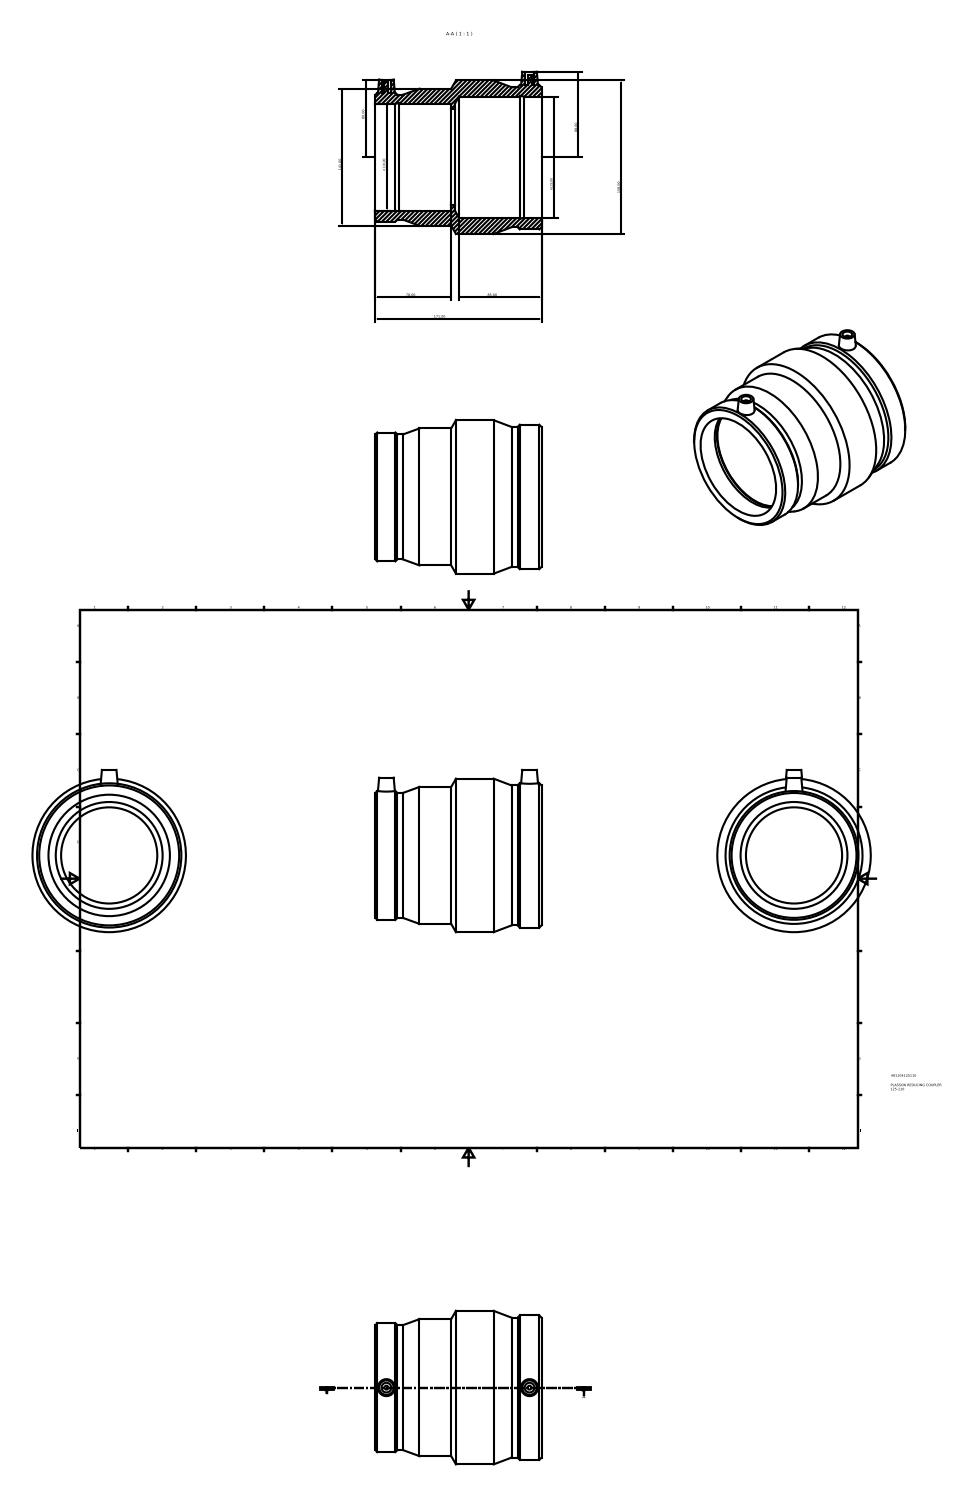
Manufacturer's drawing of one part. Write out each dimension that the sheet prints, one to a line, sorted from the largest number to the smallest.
171,00
158,00
141,00
n125,00
n110,00
88,00
85,00
80,00
78,00
